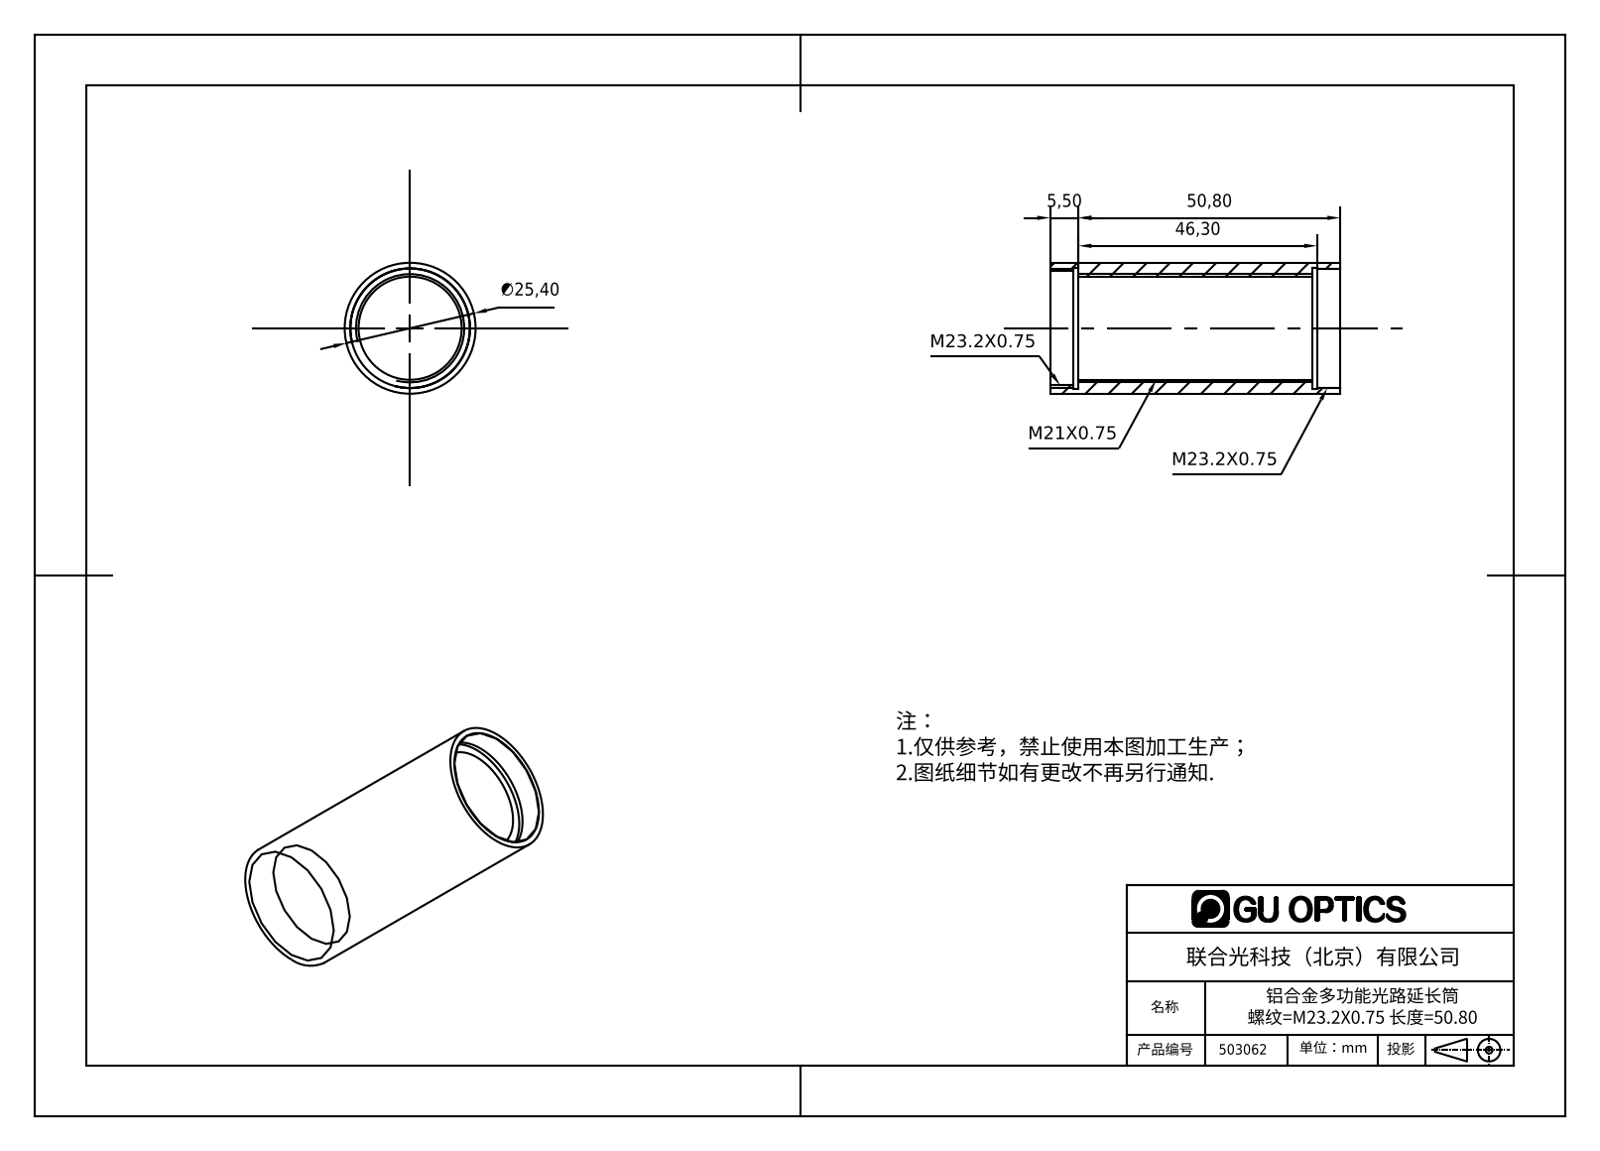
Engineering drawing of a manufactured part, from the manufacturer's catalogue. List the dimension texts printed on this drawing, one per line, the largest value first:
50,80
46,30
∅25,40
5,50
